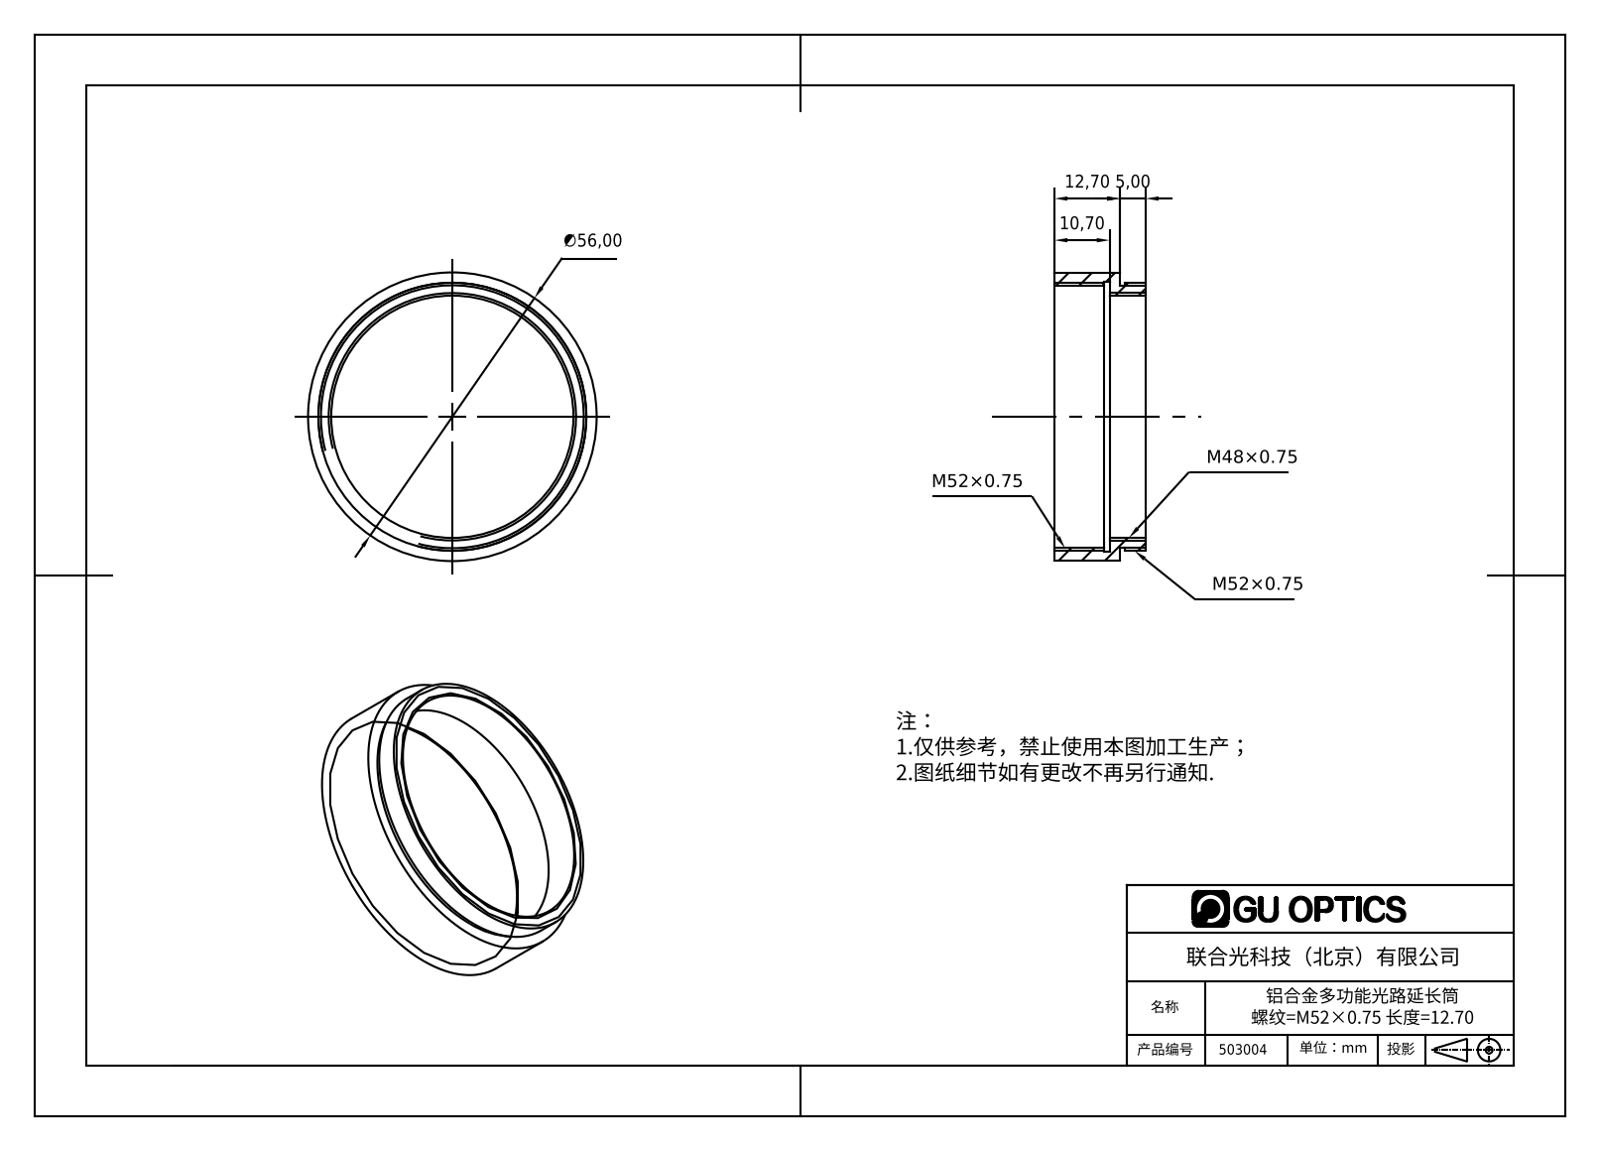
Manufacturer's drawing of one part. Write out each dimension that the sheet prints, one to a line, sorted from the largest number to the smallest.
∅56,00
12,70
10,70
5,00
